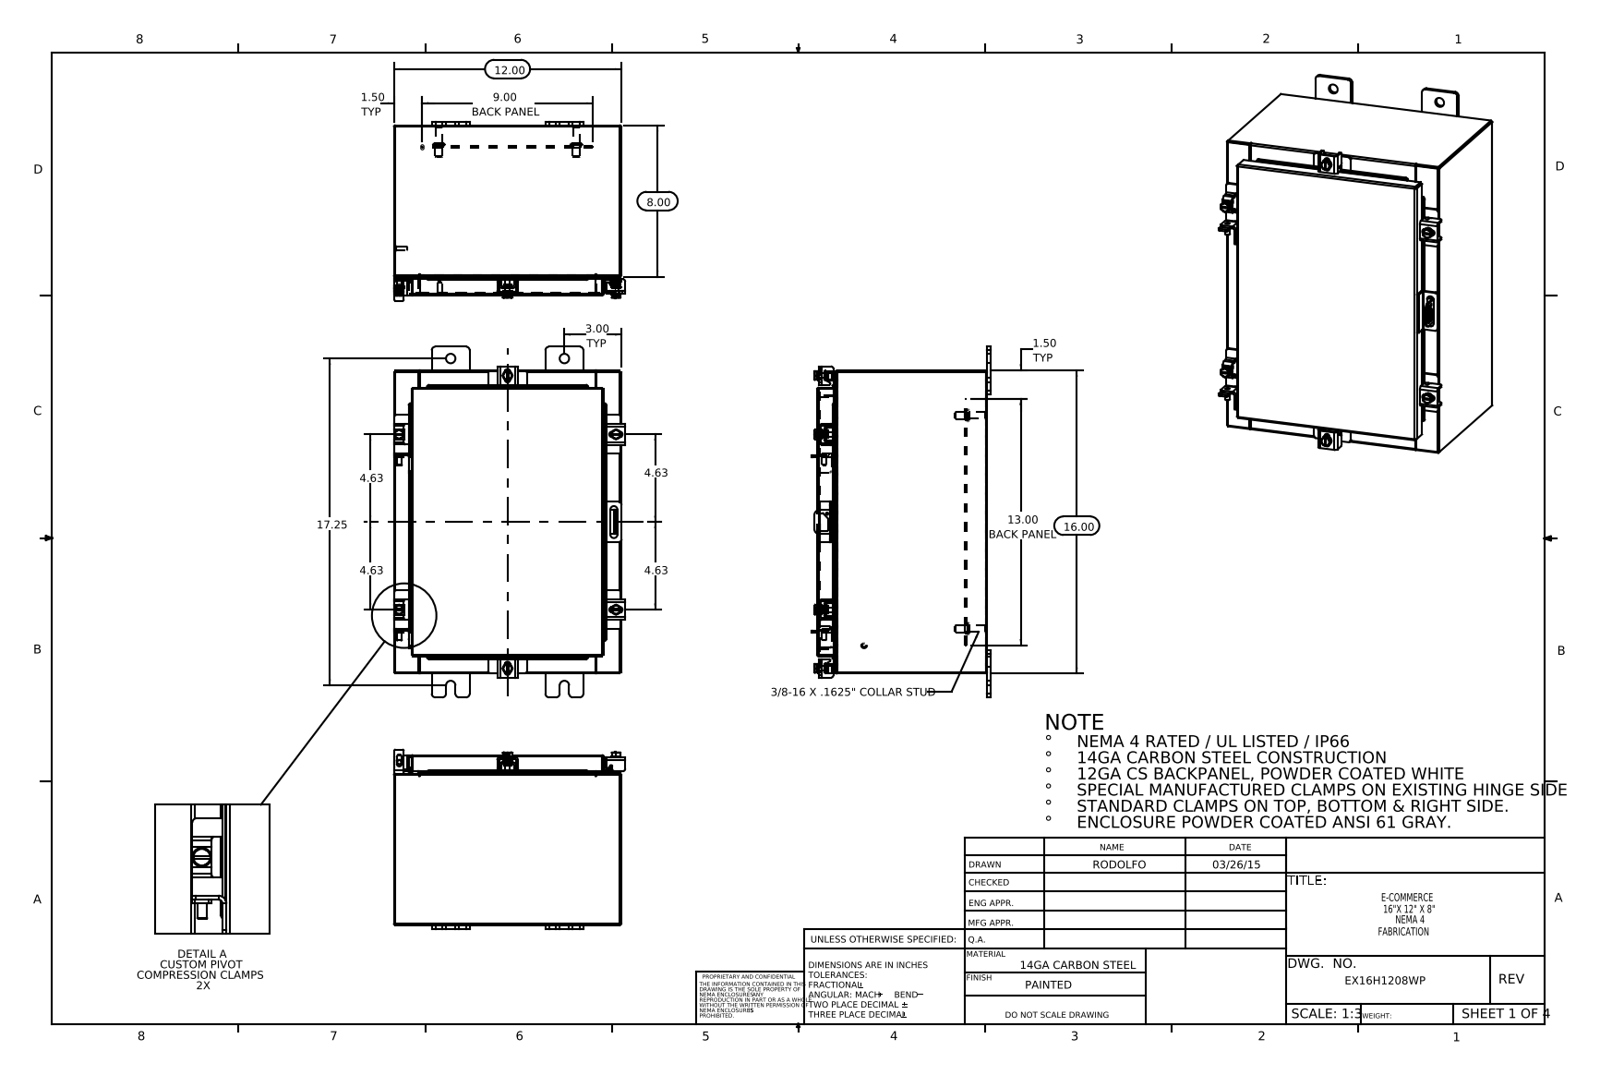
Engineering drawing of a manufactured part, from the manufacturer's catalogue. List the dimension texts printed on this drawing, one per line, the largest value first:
17.25
16.00
13.00 BACK PANEL
12.00
9.00 BACK PANEL
8.00
4.63
4.63
4.63
4.63
3.00 TYP
1.50 TYP
1.50 TYP
